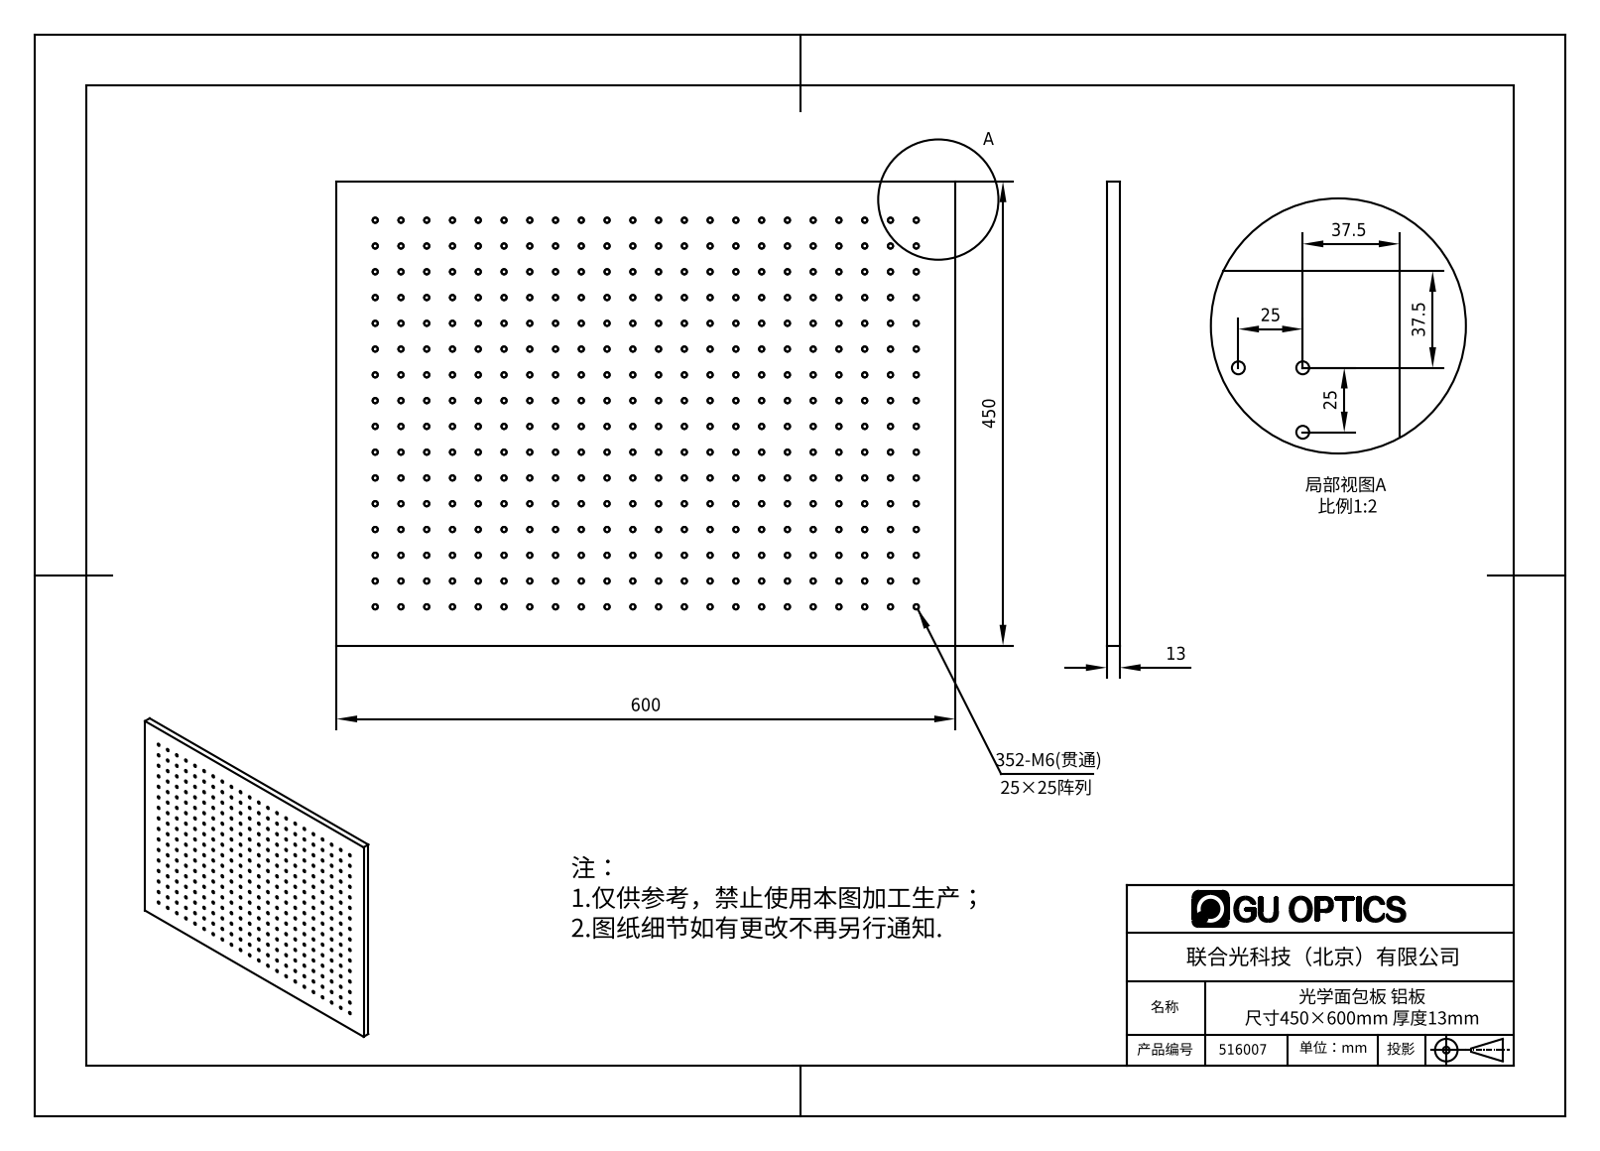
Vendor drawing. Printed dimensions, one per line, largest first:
600
450
37.5
37.5
25
25
13
